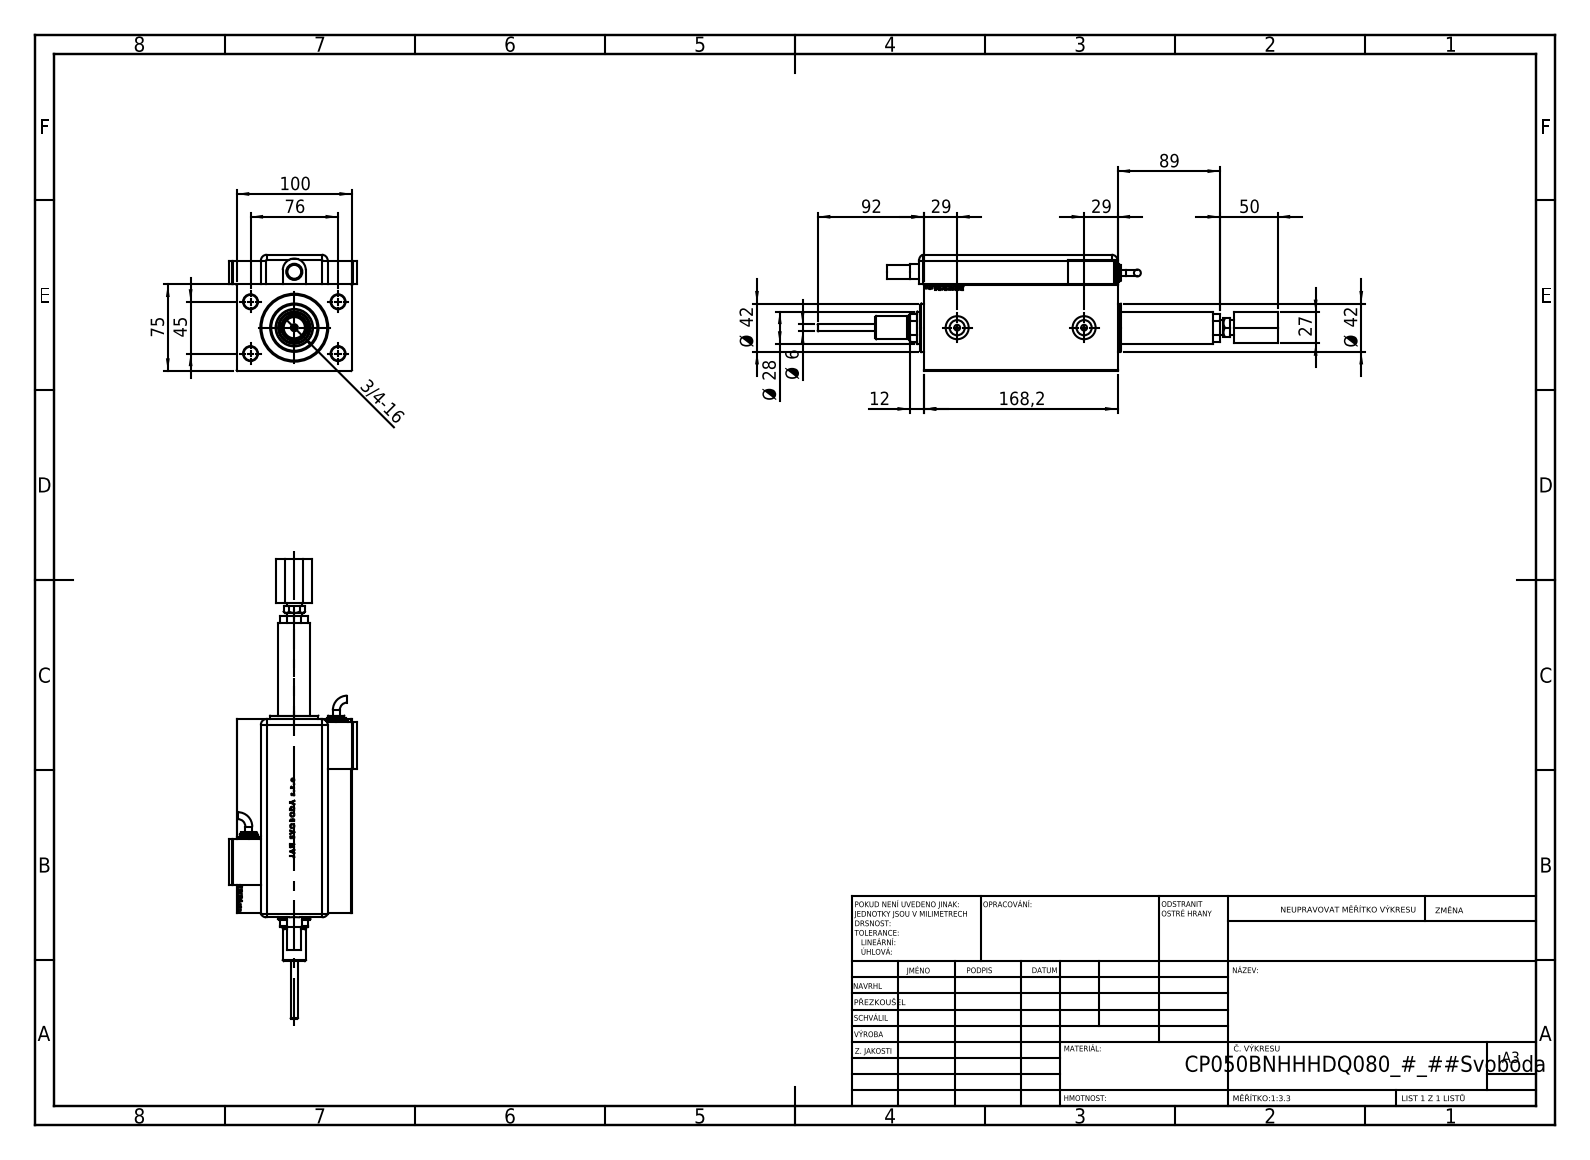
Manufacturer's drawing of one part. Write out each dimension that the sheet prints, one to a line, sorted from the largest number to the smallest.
168,2
100
92
89
76
75
50
45
Ø 42
Ø 42
29
29
Ø 28
27
12
Ø 6
3/4-16
